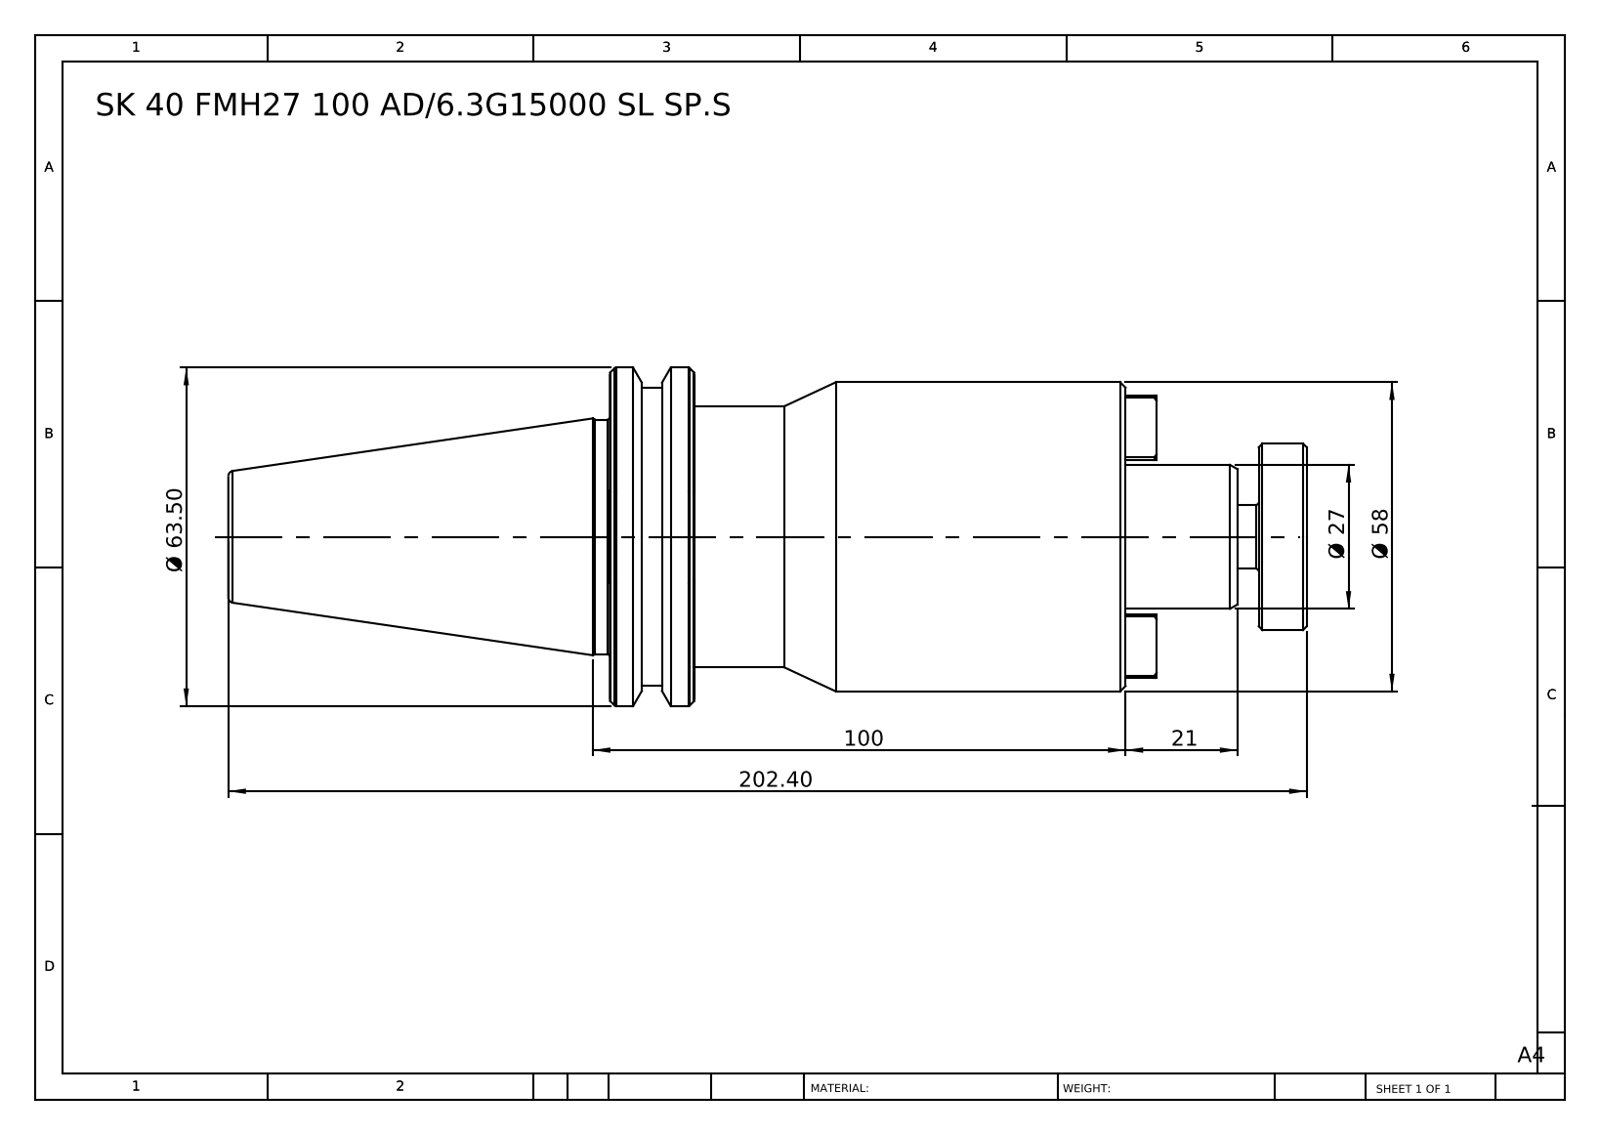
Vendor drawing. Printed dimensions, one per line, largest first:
202.40
100
Ø 63.50
Ø 58
Ø 27
21
